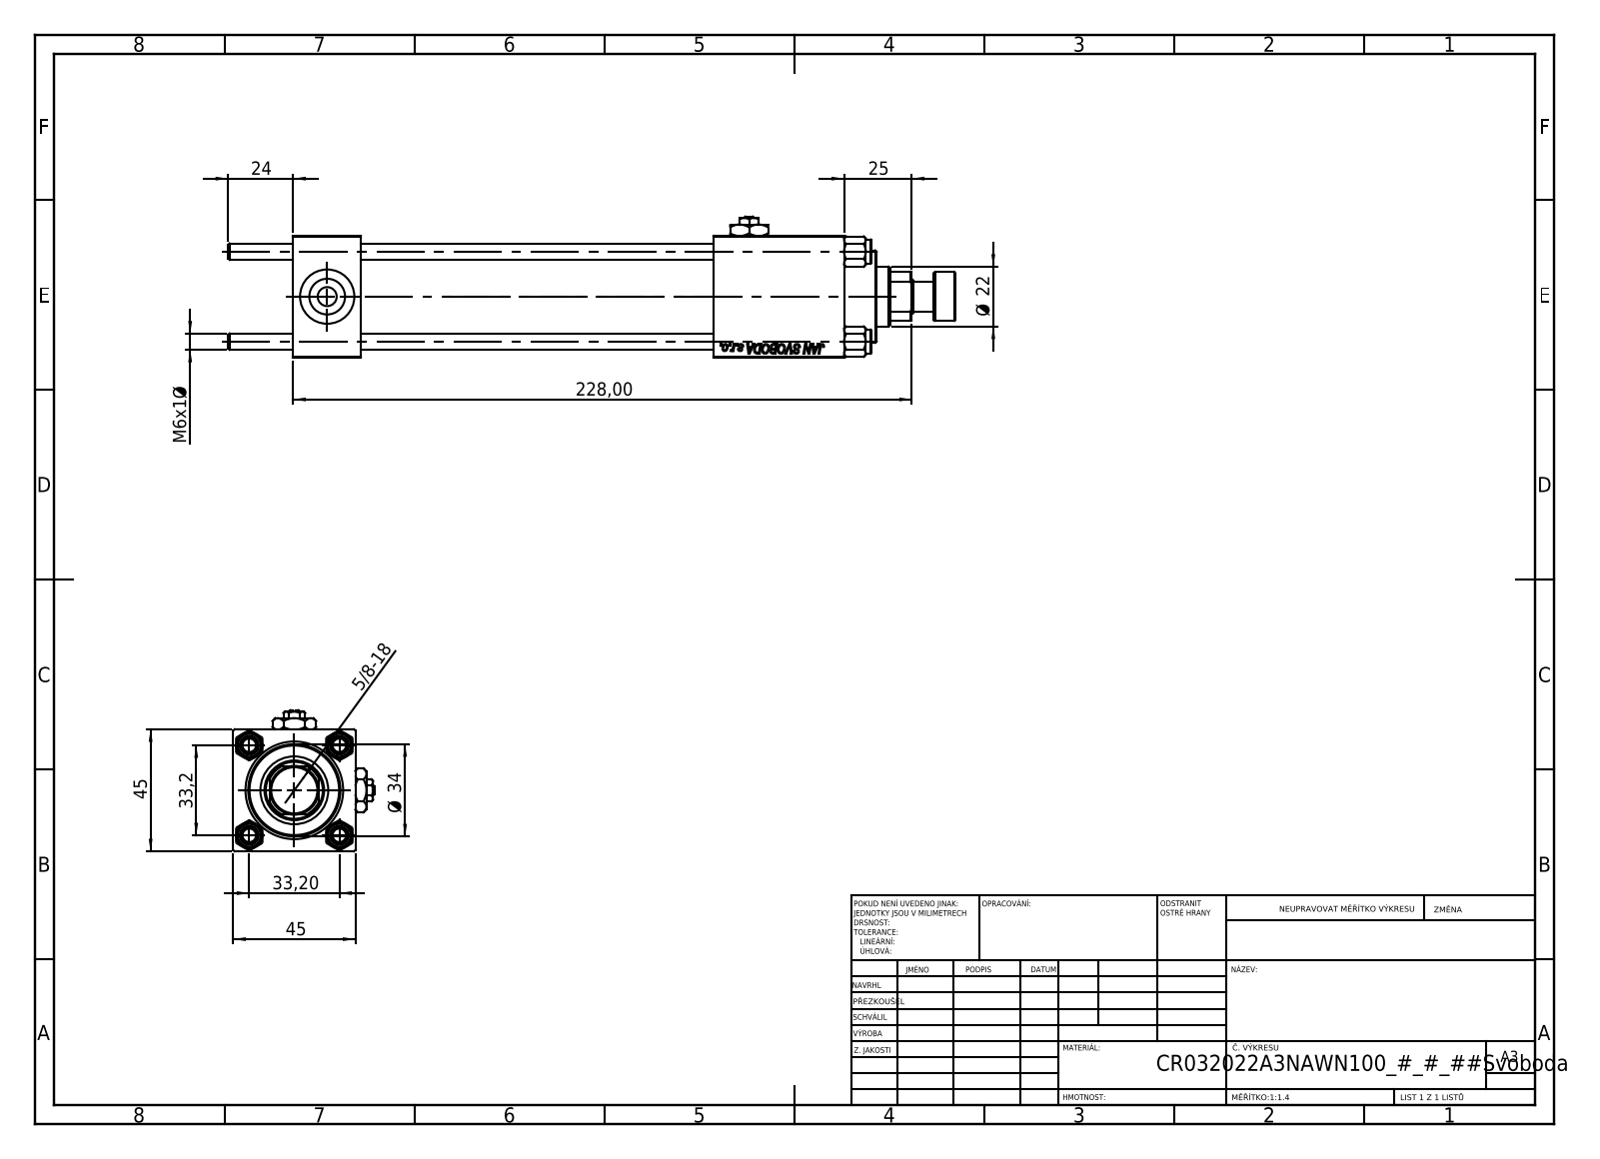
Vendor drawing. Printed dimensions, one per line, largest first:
228,00
45
45
Ø 34
33,2
33,20
25
24
Ø 22
M6x1 Ø
5/8-18
